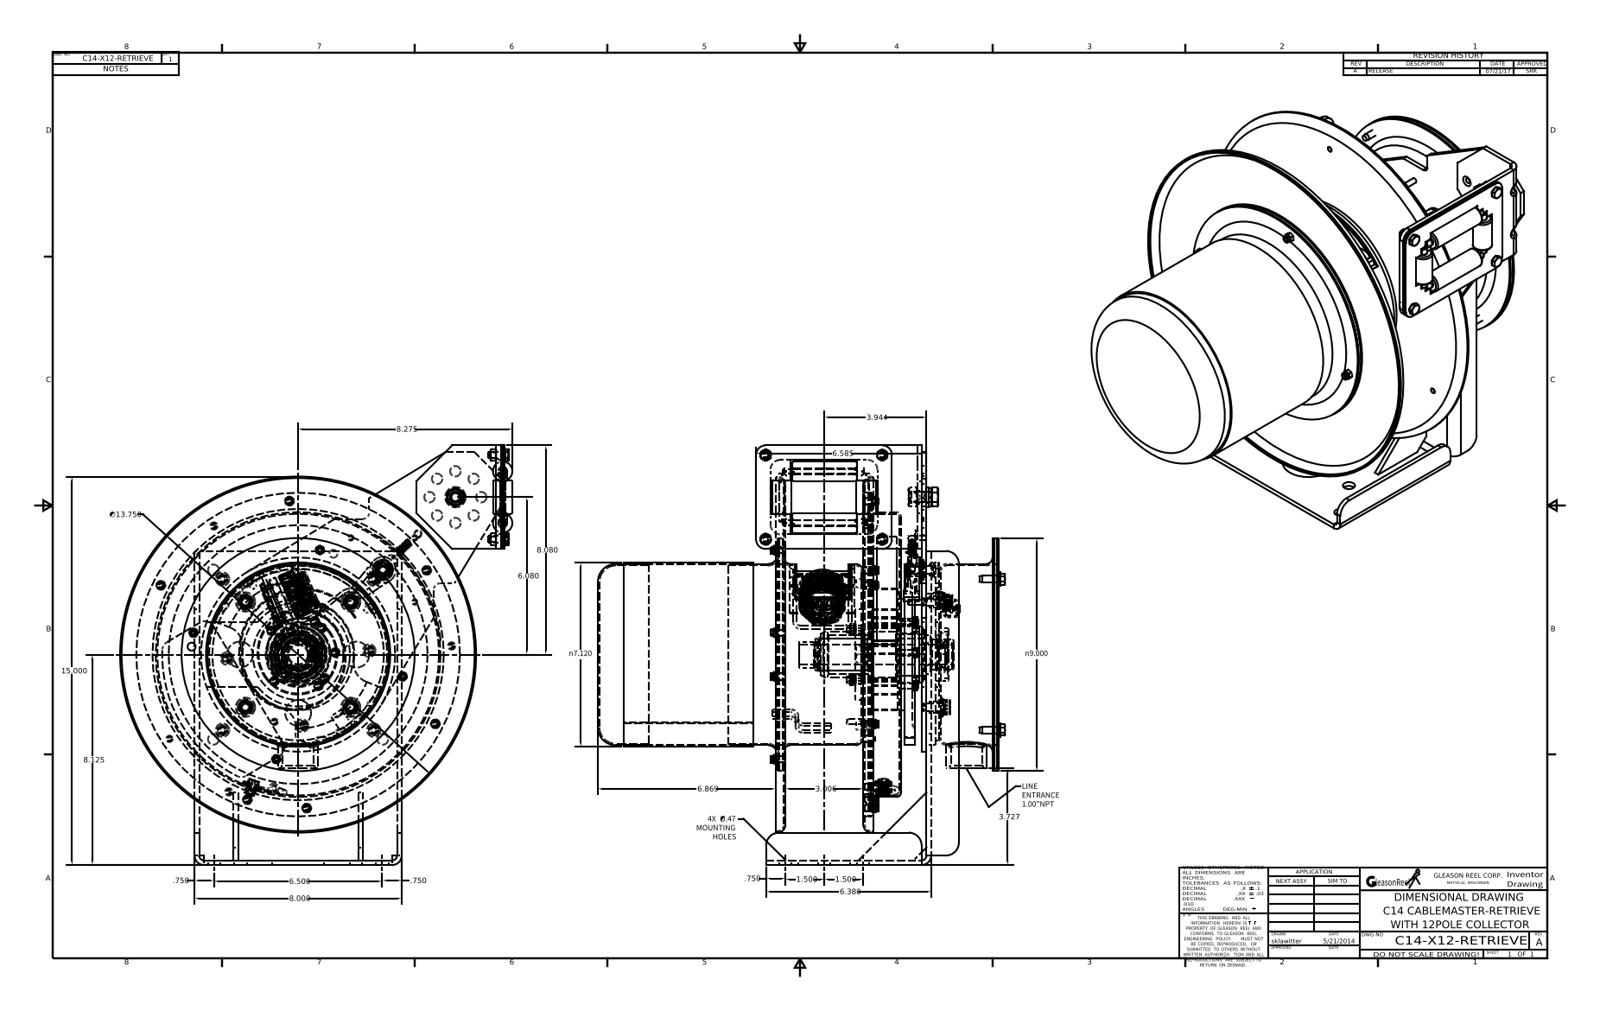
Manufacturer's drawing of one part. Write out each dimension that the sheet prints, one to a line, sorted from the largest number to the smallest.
15.000
∅13.750
n9.000
8.275
8.125
8.080
8.000
n7.120
6.869
6.585
6.500
6.380
6.080
3.944
3.727
3.006
1.500
1.500
.750
.750
.750
